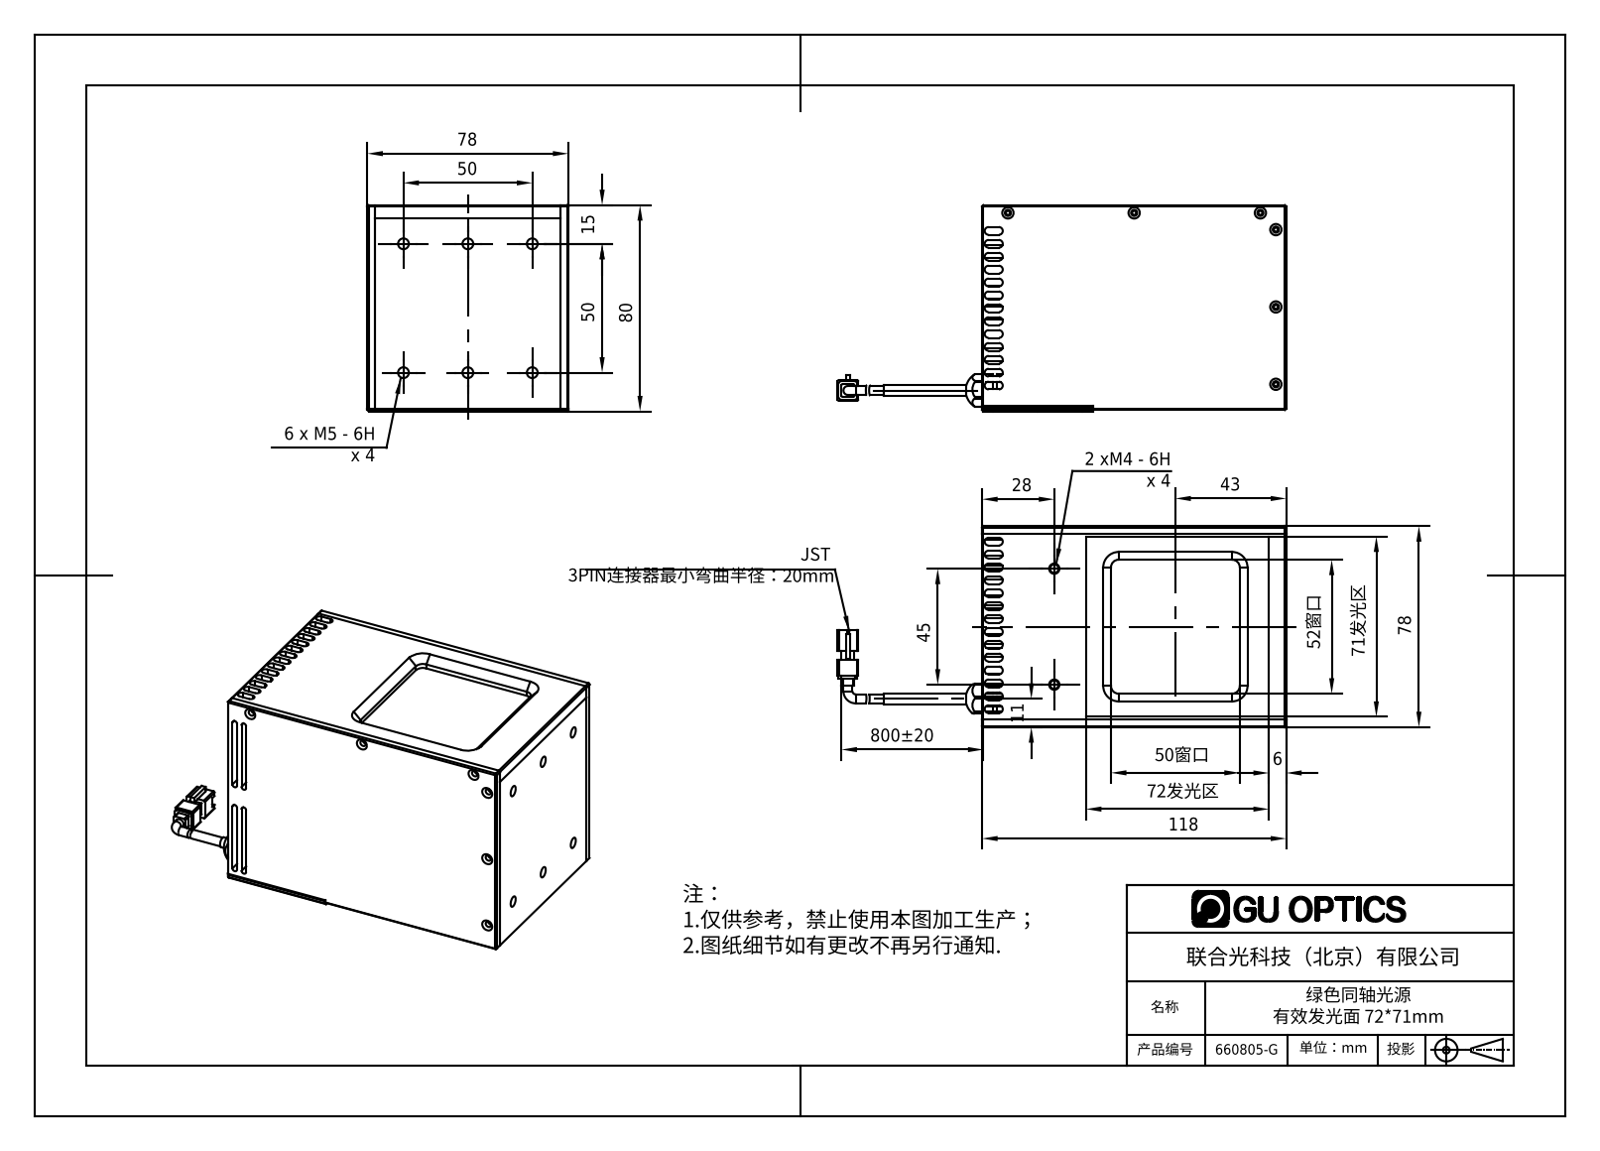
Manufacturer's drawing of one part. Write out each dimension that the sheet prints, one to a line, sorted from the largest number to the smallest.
800±20
118
80
78
78
72发光区
71发光区
52窗口
50
50
50窗口
45
43
28
15
11
6
